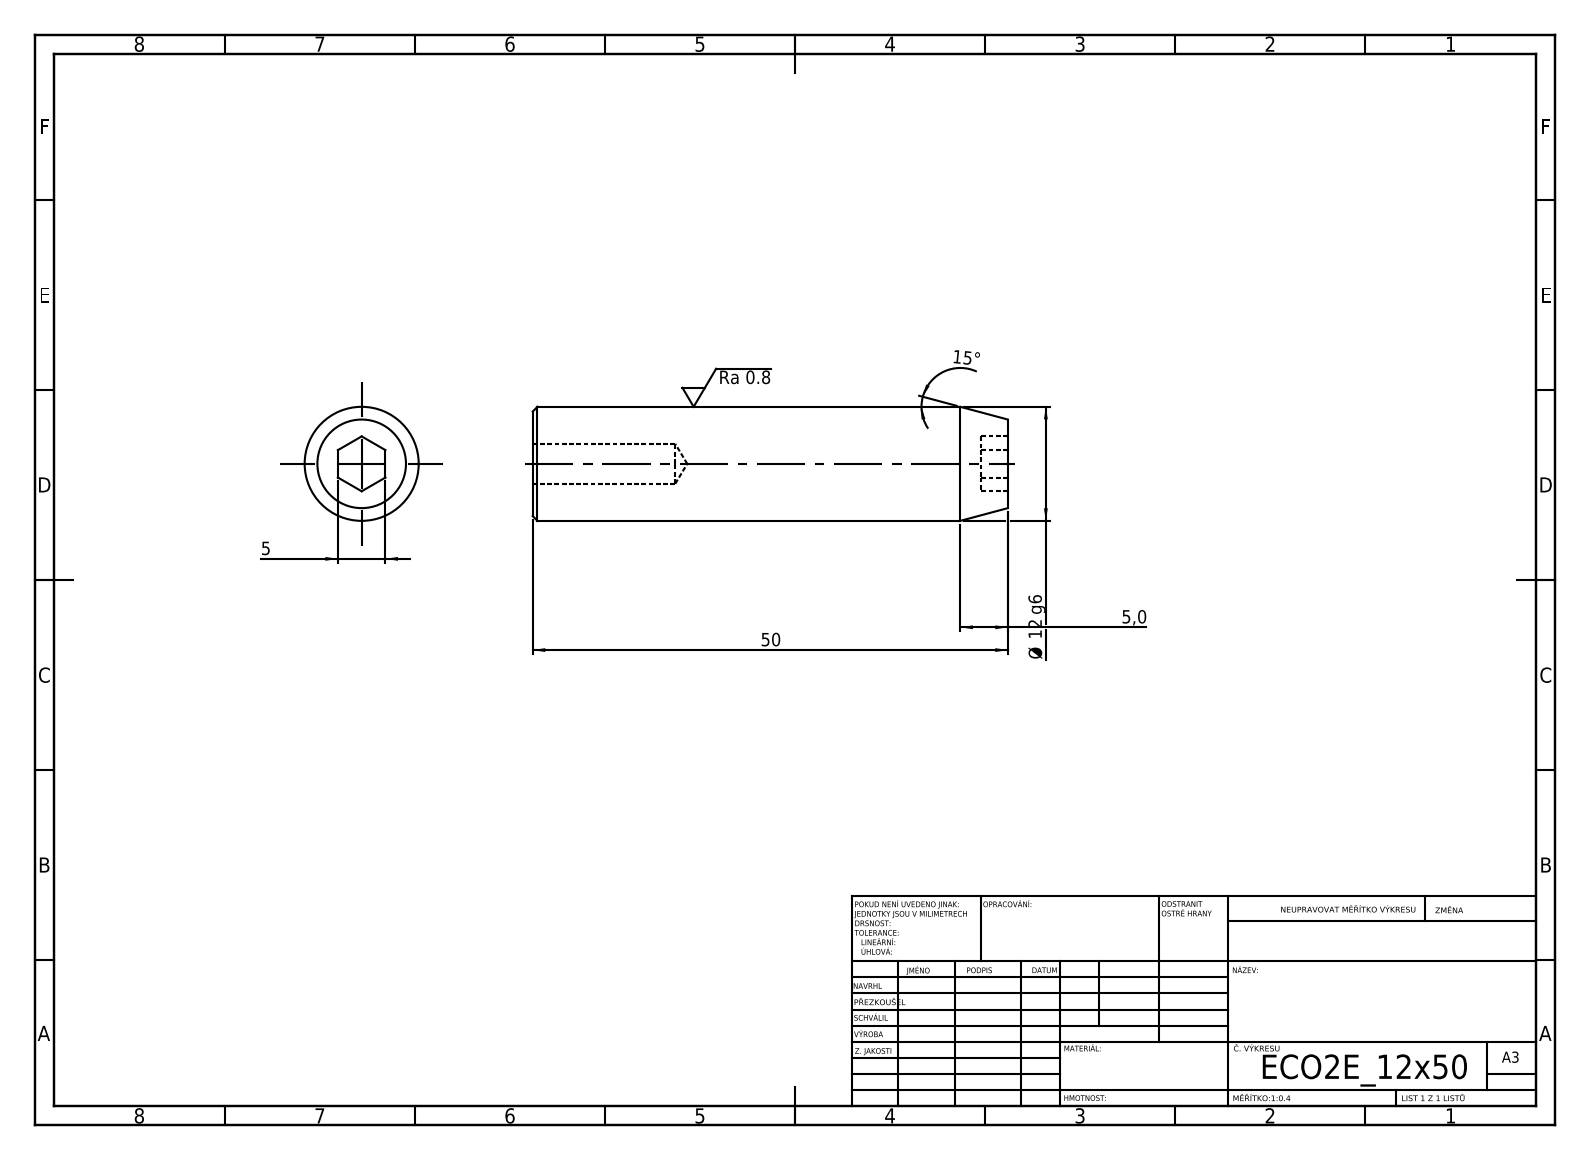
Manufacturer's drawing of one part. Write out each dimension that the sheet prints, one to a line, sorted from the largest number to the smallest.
50
15°
Ø 12 g6
5,0
5
